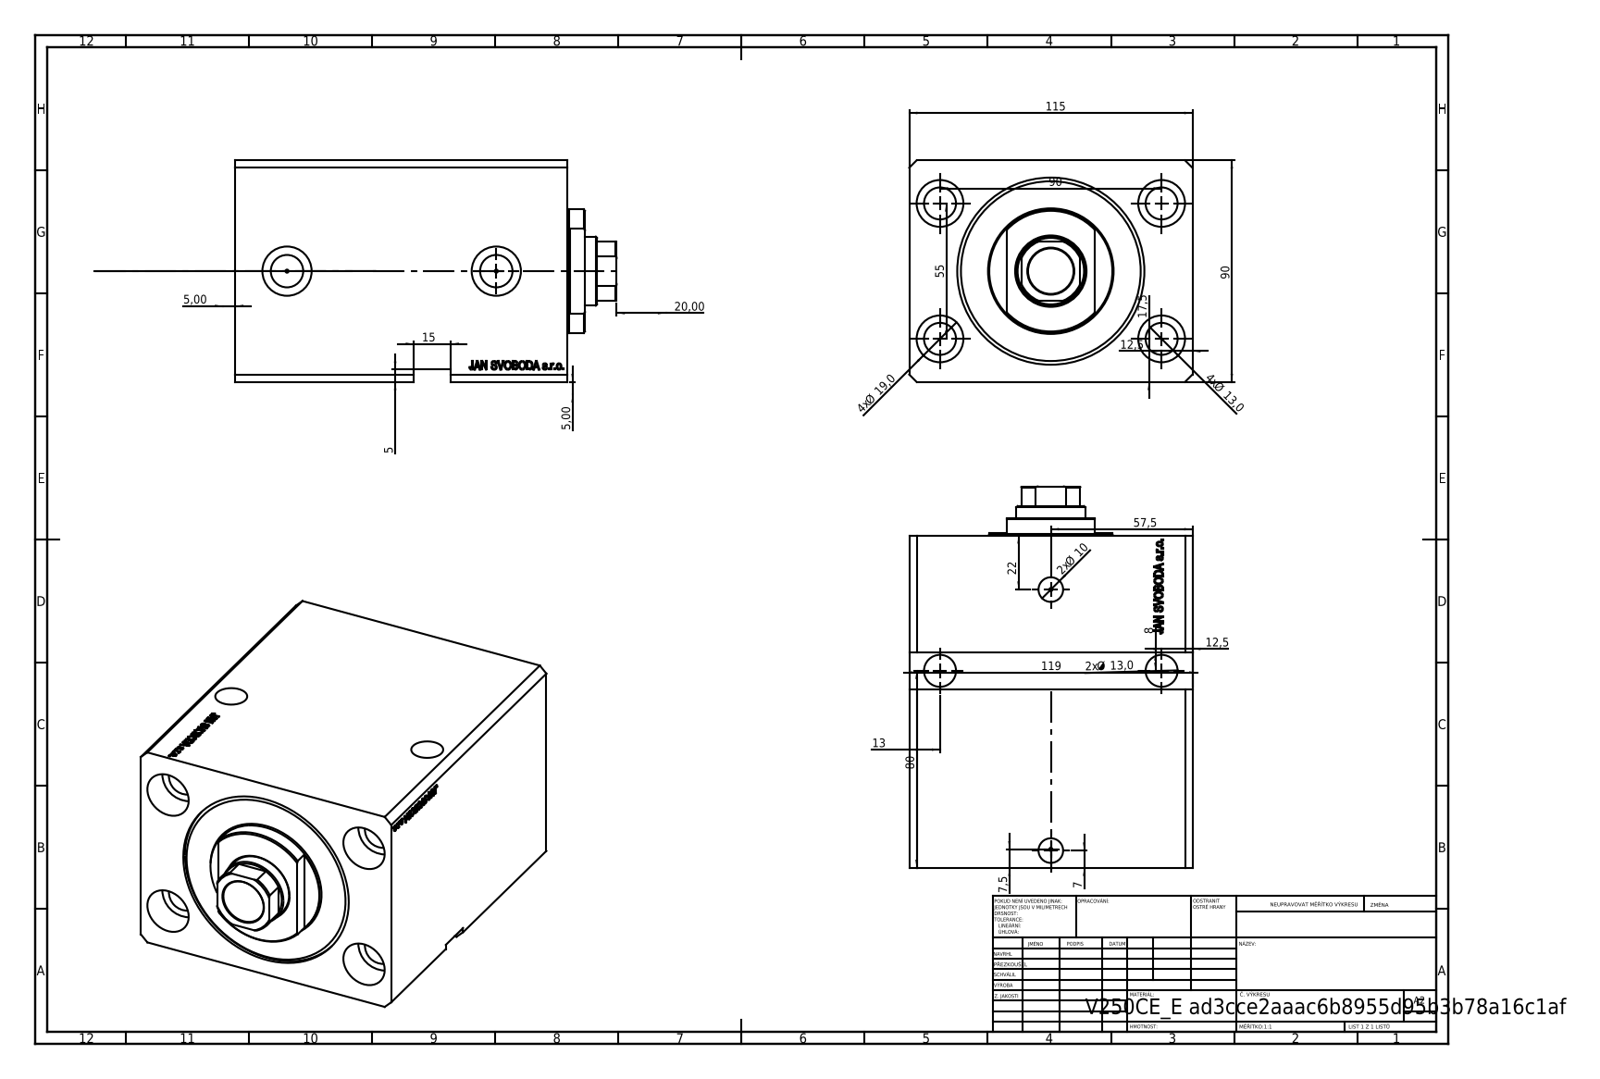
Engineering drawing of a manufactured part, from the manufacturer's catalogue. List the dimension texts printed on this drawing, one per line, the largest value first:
119
115
90
90
80
57,5
55
22
20,00
4x Ø 19,0
17,5
15
4x Ø 13,0
2x Ø 13,0
13
12,5
12,5
2x Ø 10
8
7,5
7
5,00
5,00
5
